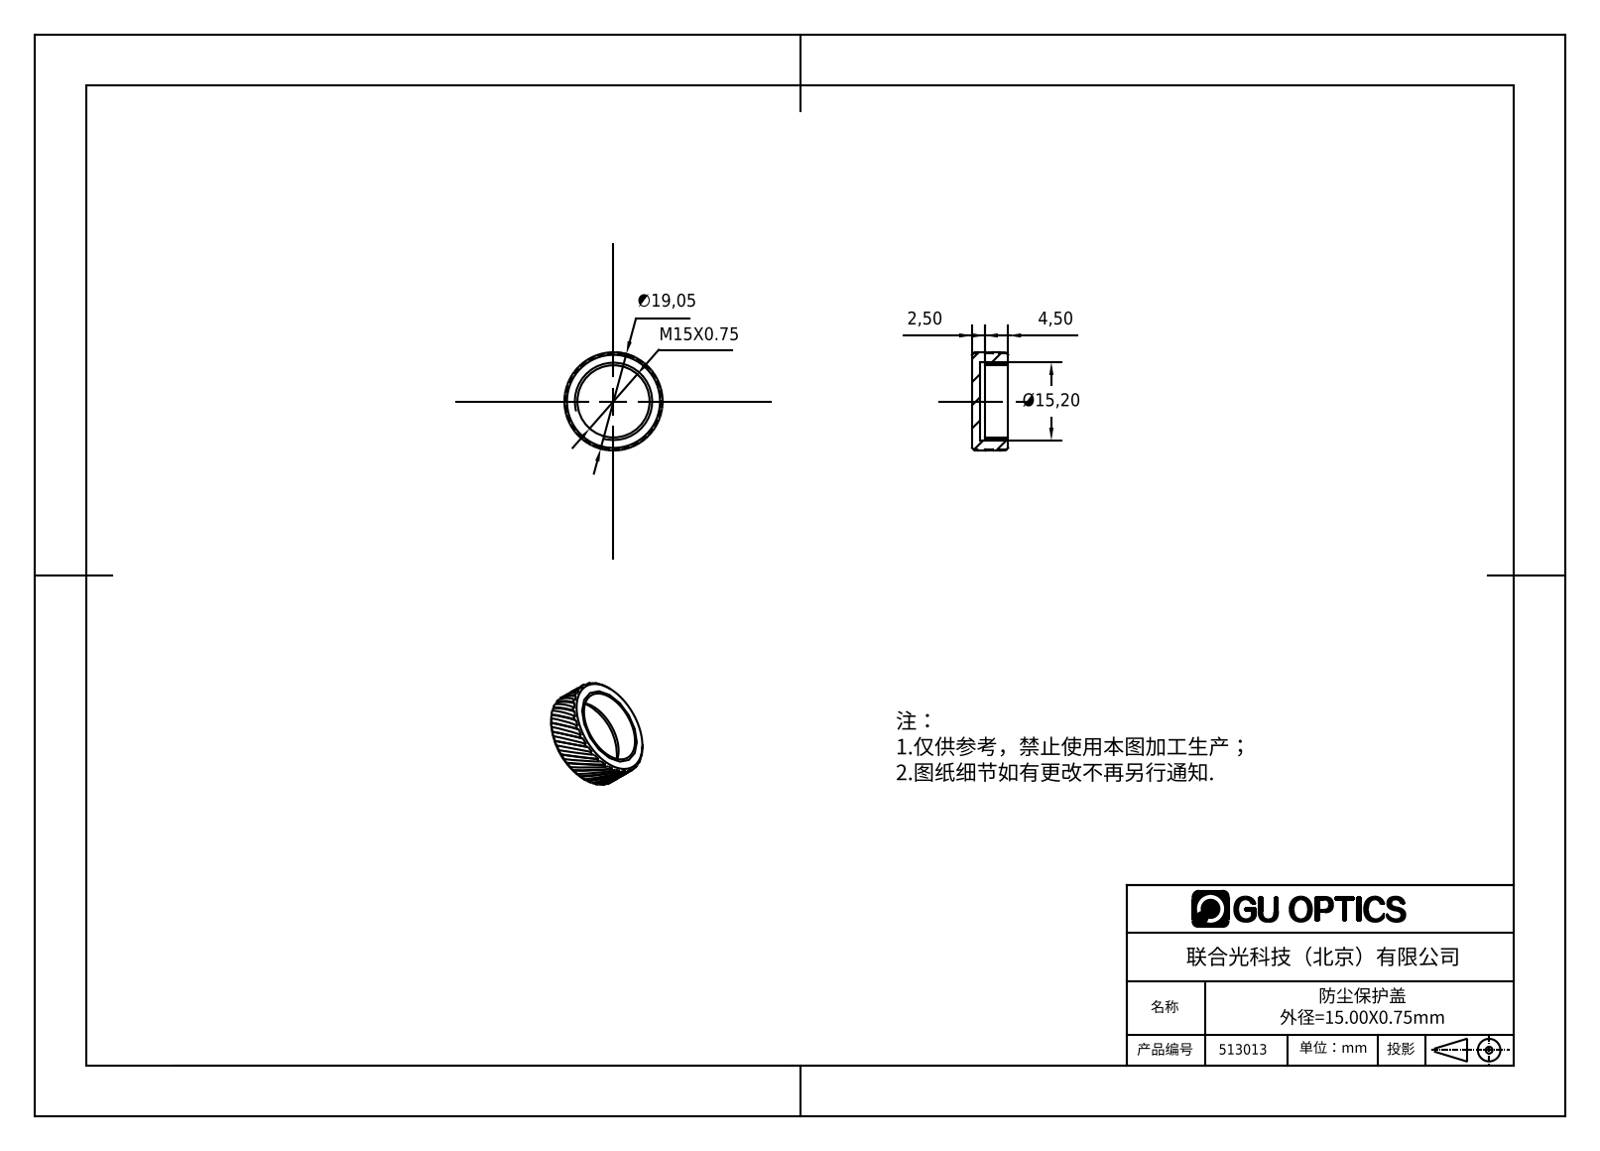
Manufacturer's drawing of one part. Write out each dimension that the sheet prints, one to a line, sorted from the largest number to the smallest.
∅19,05
Ø15,20
M15X0.75
4,50
2,50
